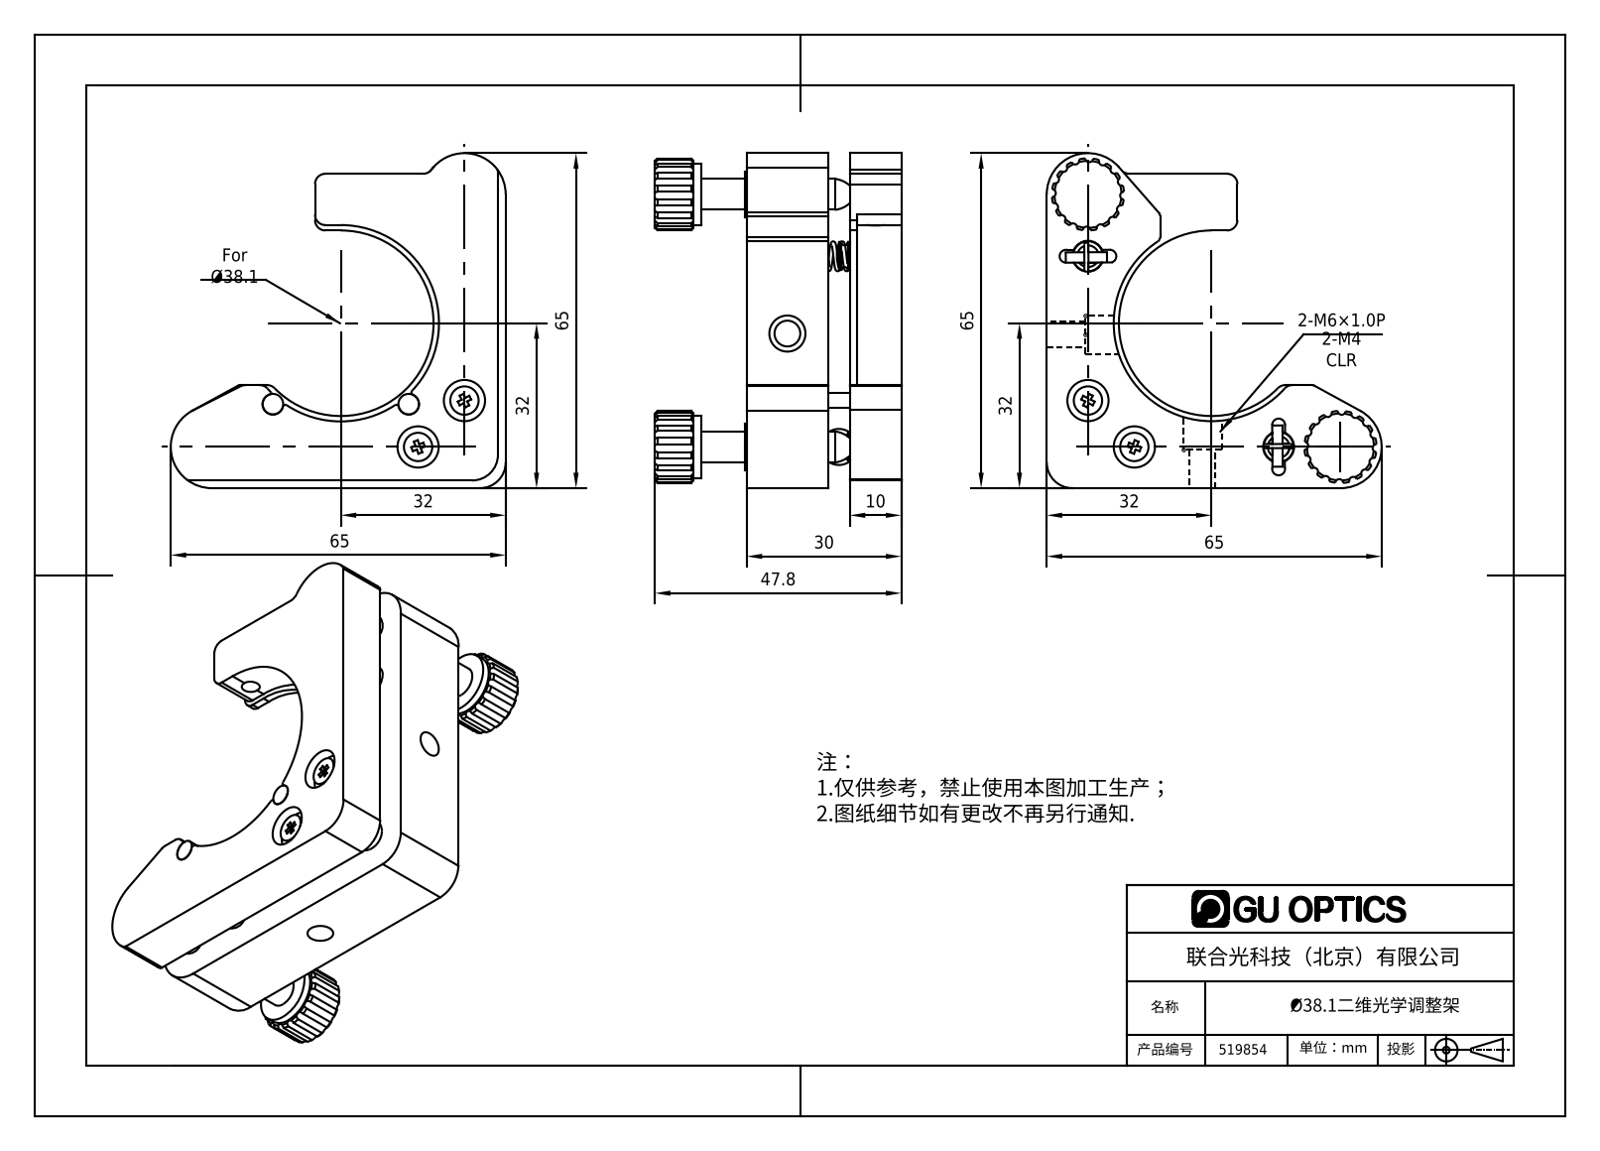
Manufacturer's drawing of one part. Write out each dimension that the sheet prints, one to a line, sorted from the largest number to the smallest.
65
65
65
65
47.8
32
32
32
32
30
10
